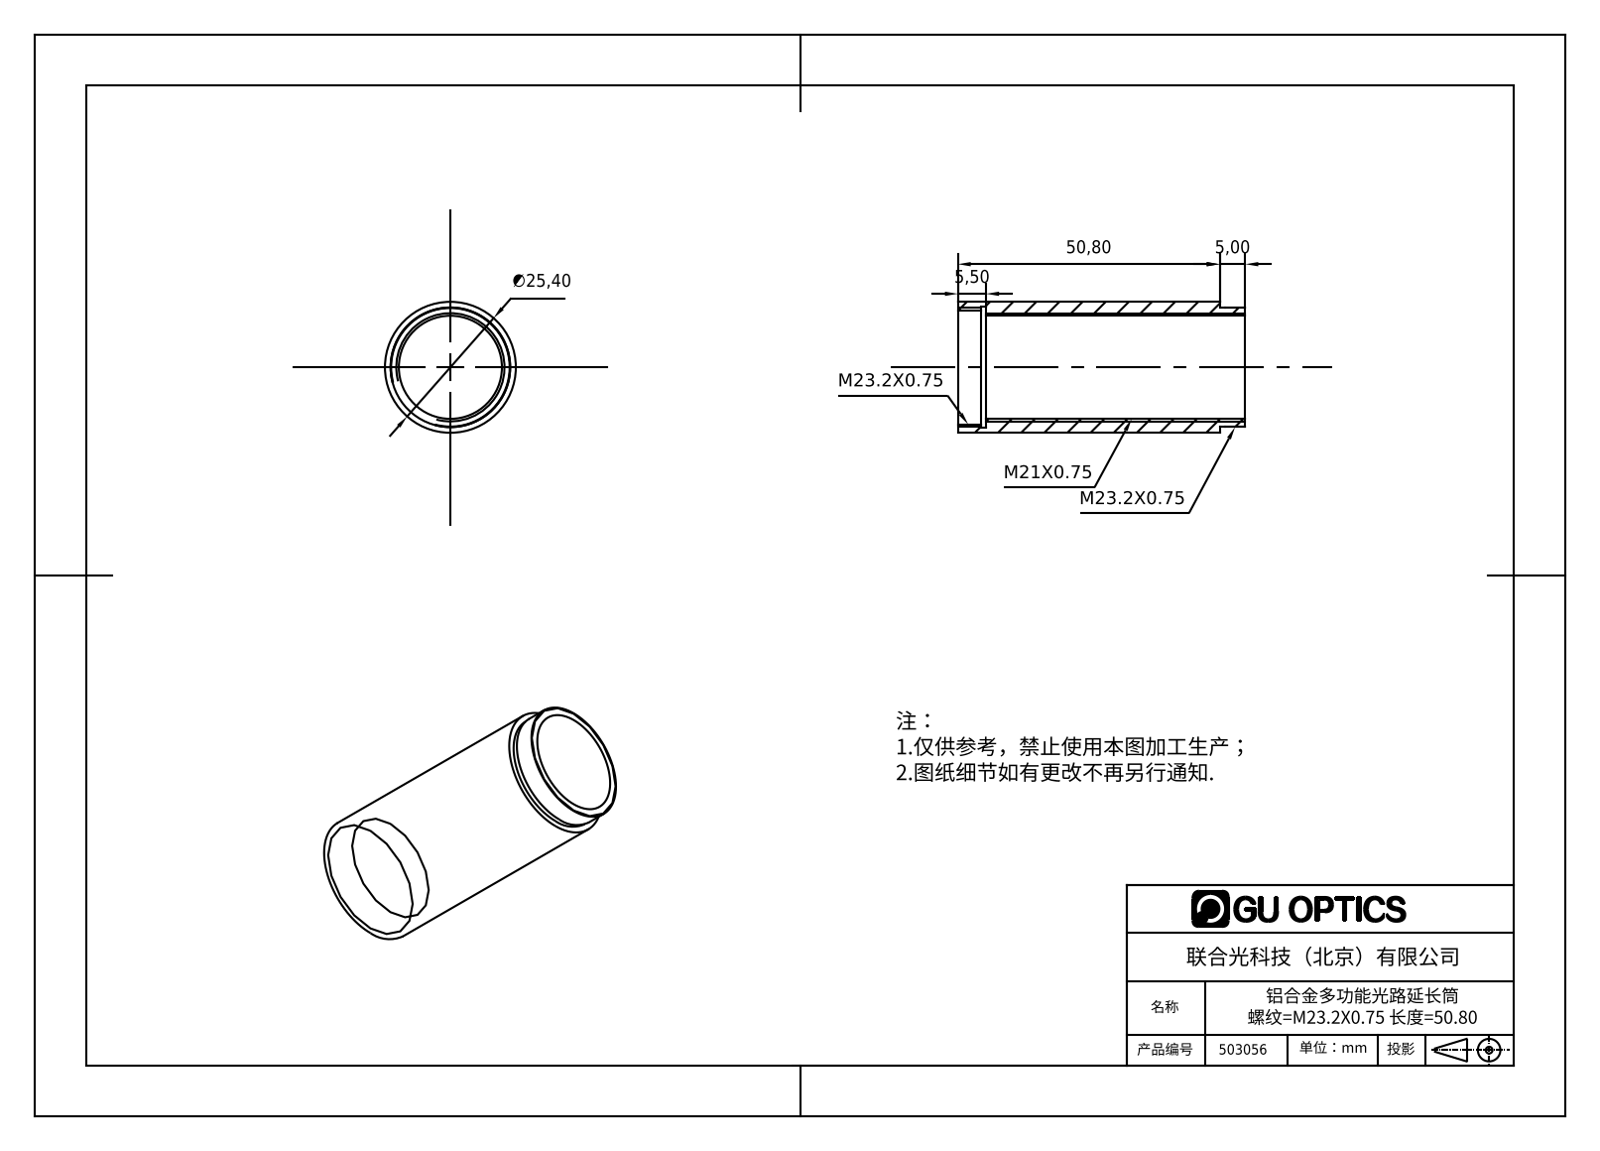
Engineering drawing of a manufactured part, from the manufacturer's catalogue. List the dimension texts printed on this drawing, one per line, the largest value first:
50,80
∅25,40
5,50
5,00
